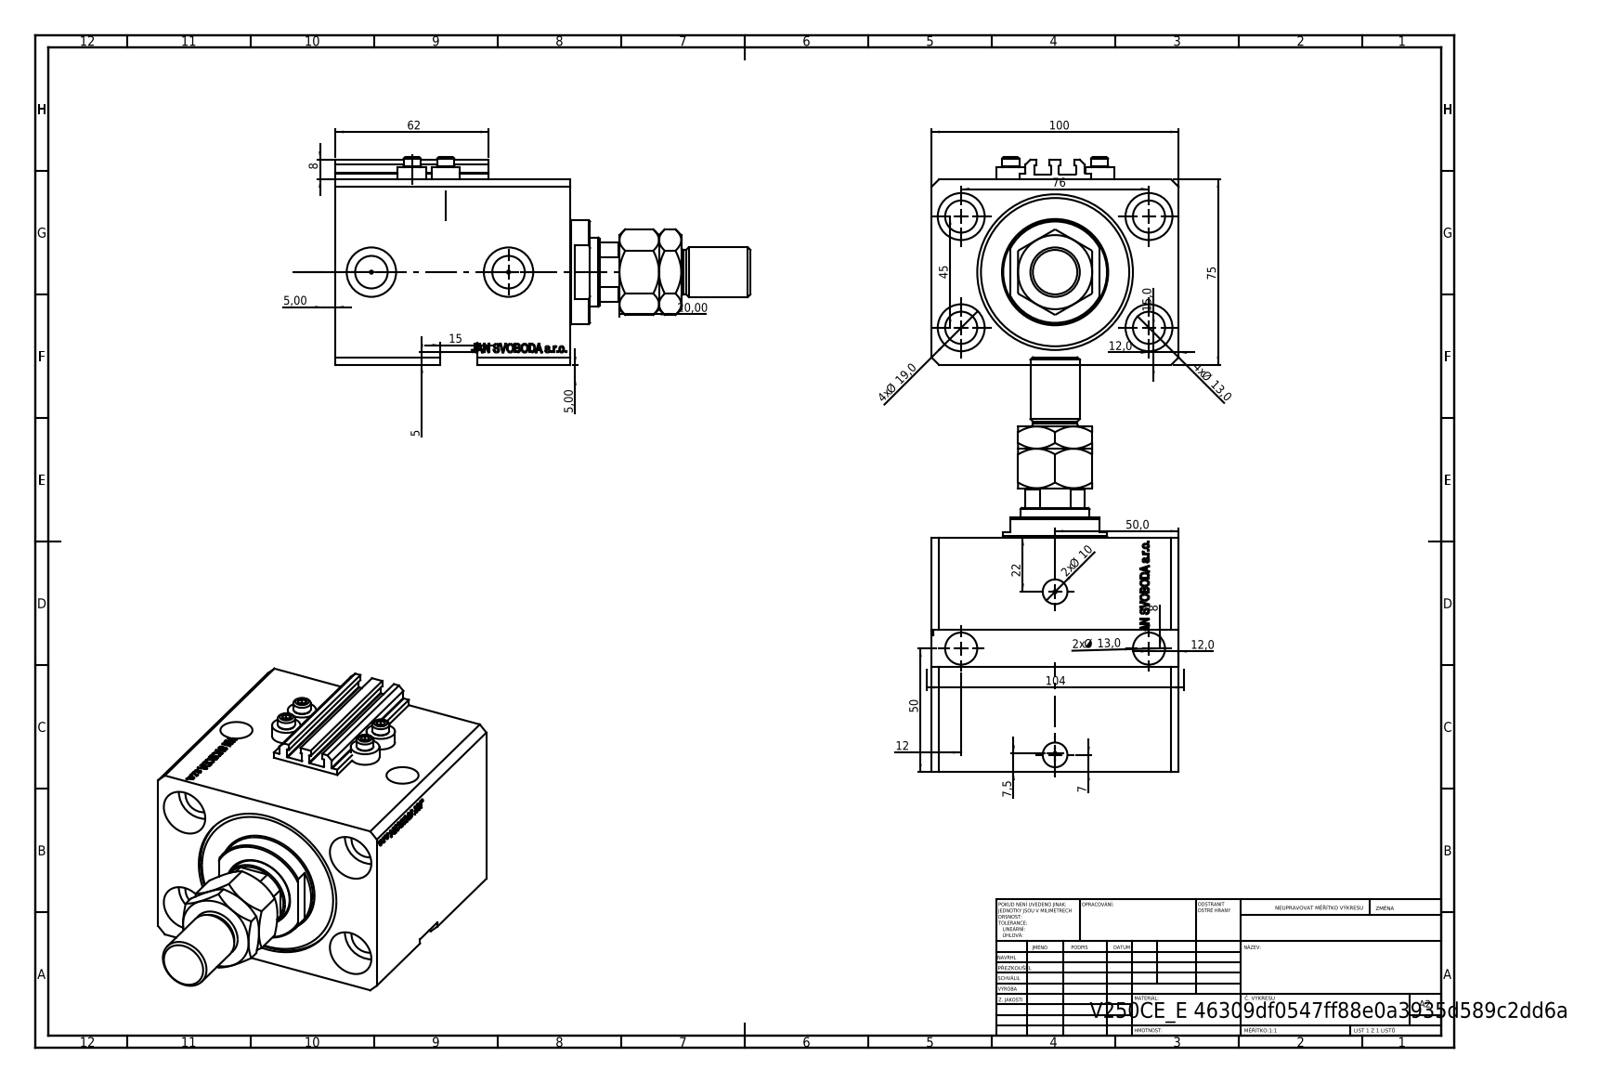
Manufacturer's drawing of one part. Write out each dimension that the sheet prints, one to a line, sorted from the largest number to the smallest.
104
100
76
75
62
50,0
50
45
22
20,00
4x Ø 19,0
15,0
15
4x Ø 13,0
2x Ø 13,0
12,0
12,0
12
2x Ø 10
8
8
7,5
7
5,00
5,00
5
